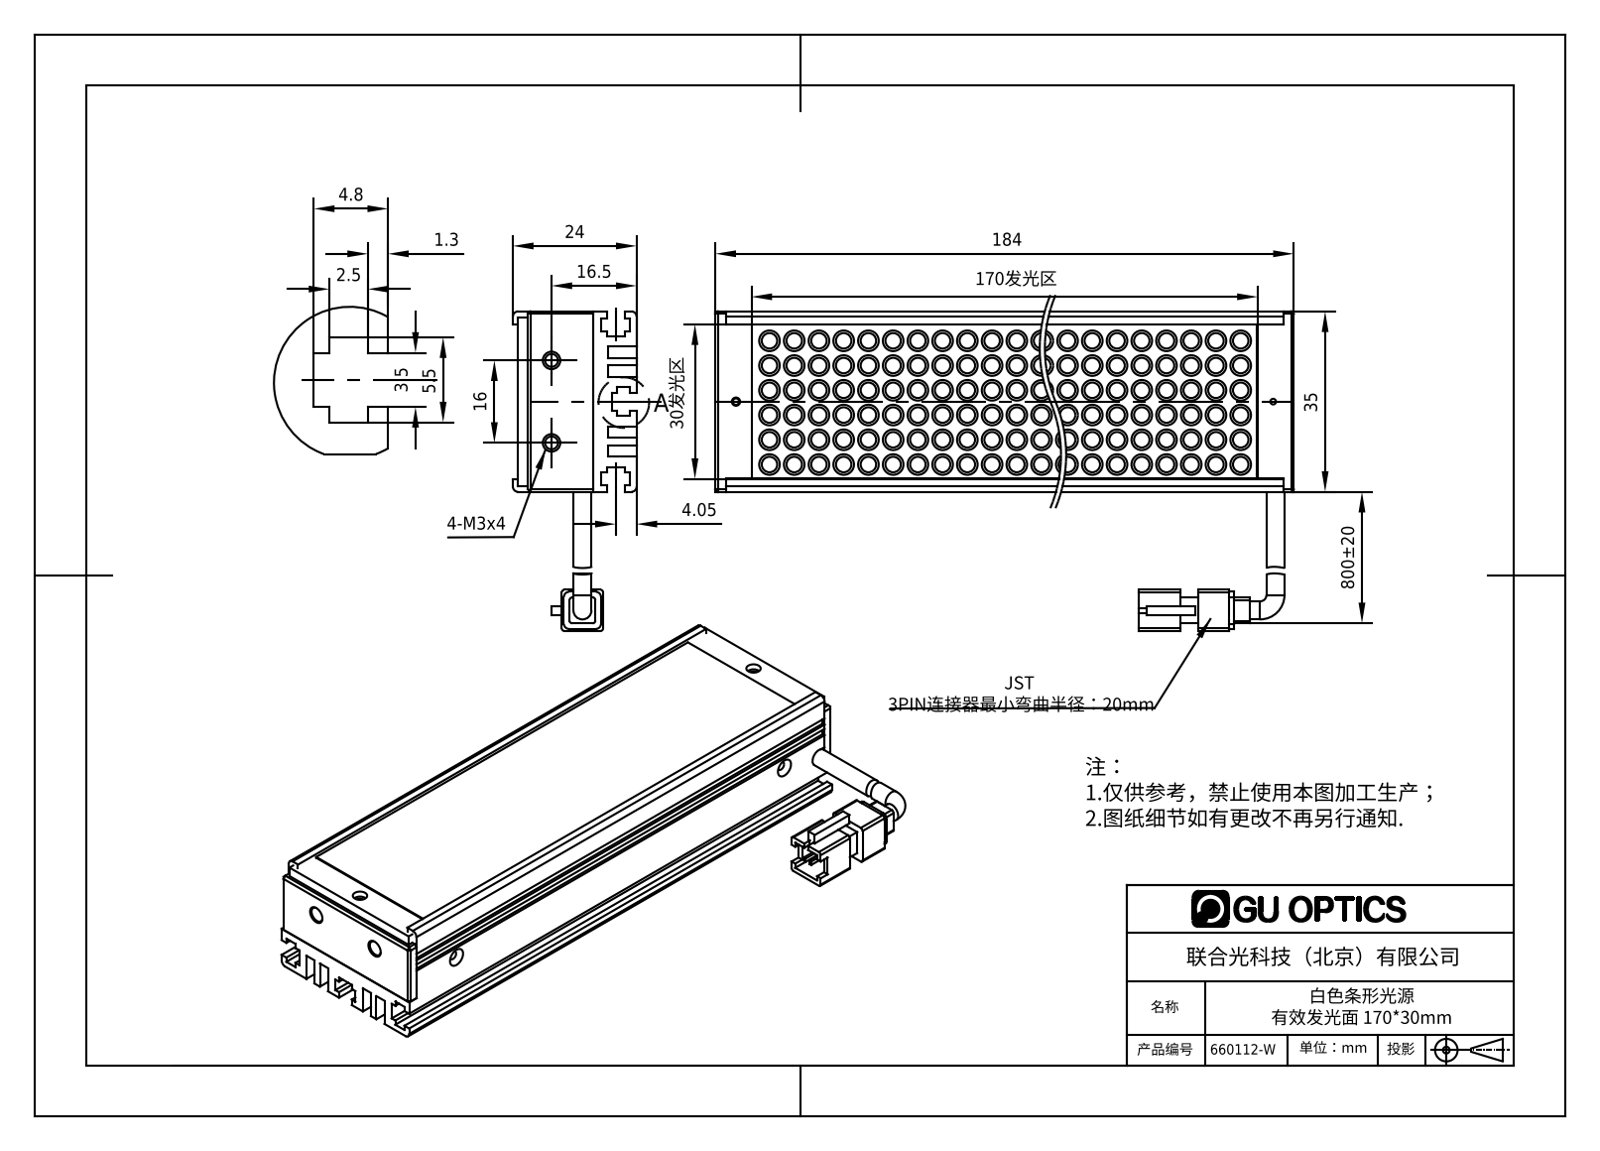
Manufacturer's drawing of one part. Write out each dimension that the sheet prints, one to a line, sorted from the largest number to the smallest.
800±20
184
170发光区
35
30发光区
24
16.5
16
5.5
4.8
4.05
3.5
2.5
1.3
